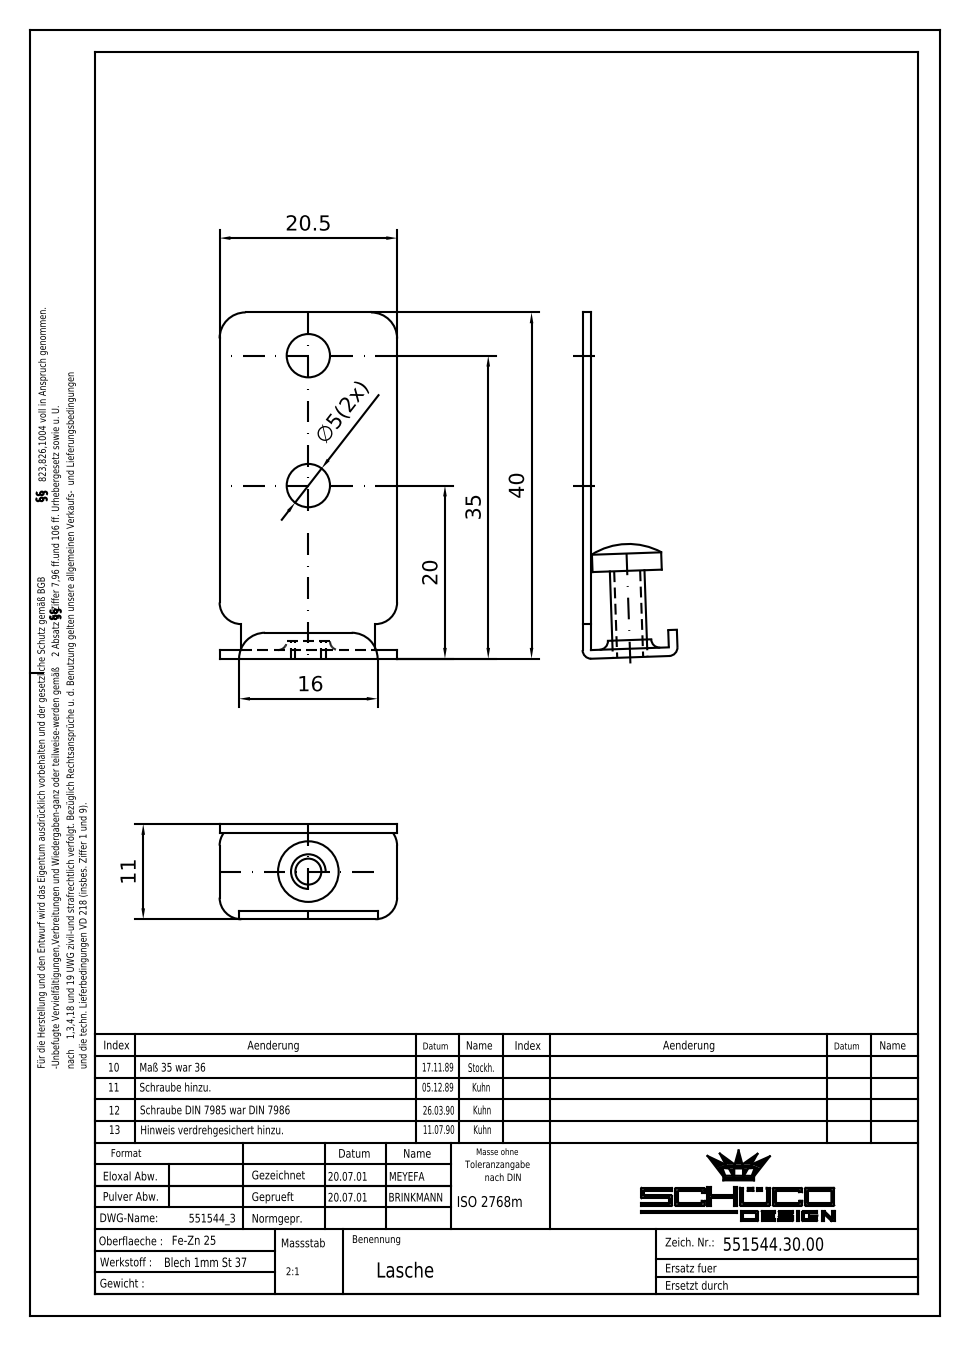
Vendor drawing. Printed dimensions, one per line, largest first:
40
35
20.5
20
16
11
∅5(2x)
